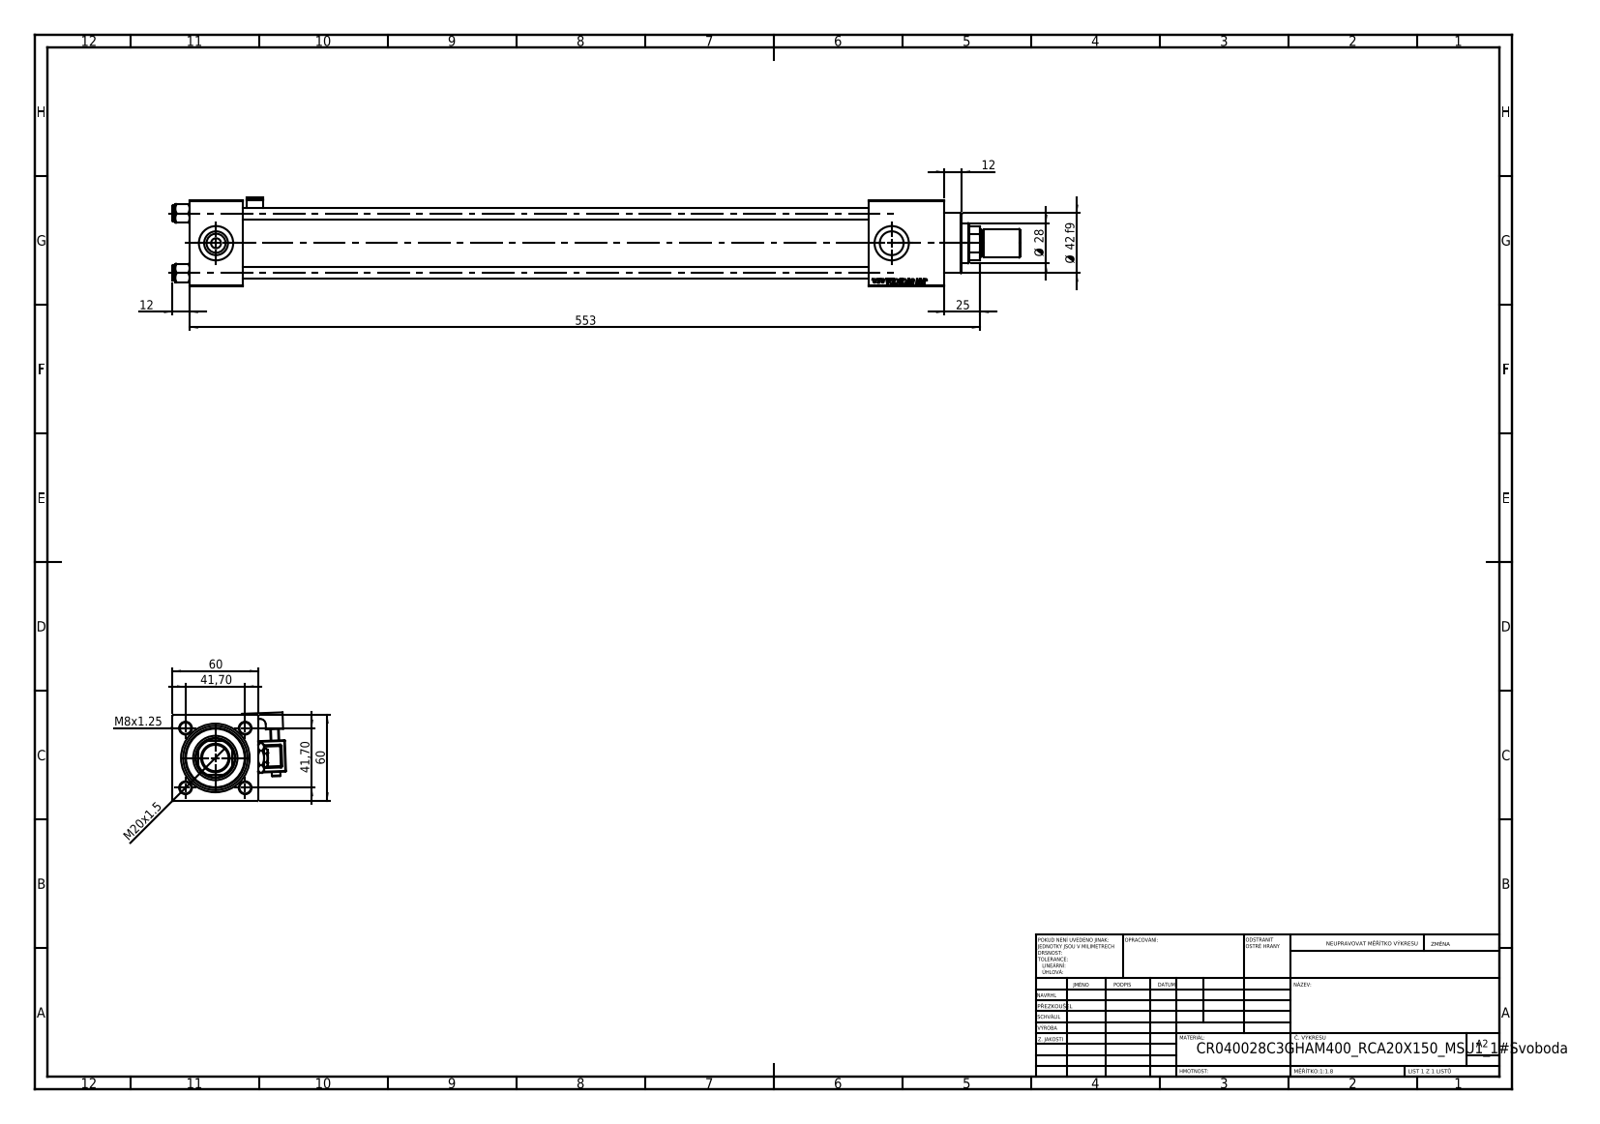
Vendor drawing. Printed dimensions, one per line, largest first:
553
60
60
Ø 42 f9
41,70
41,70
Ø 28
25
M20x1.5
12
12
M8x1.25
